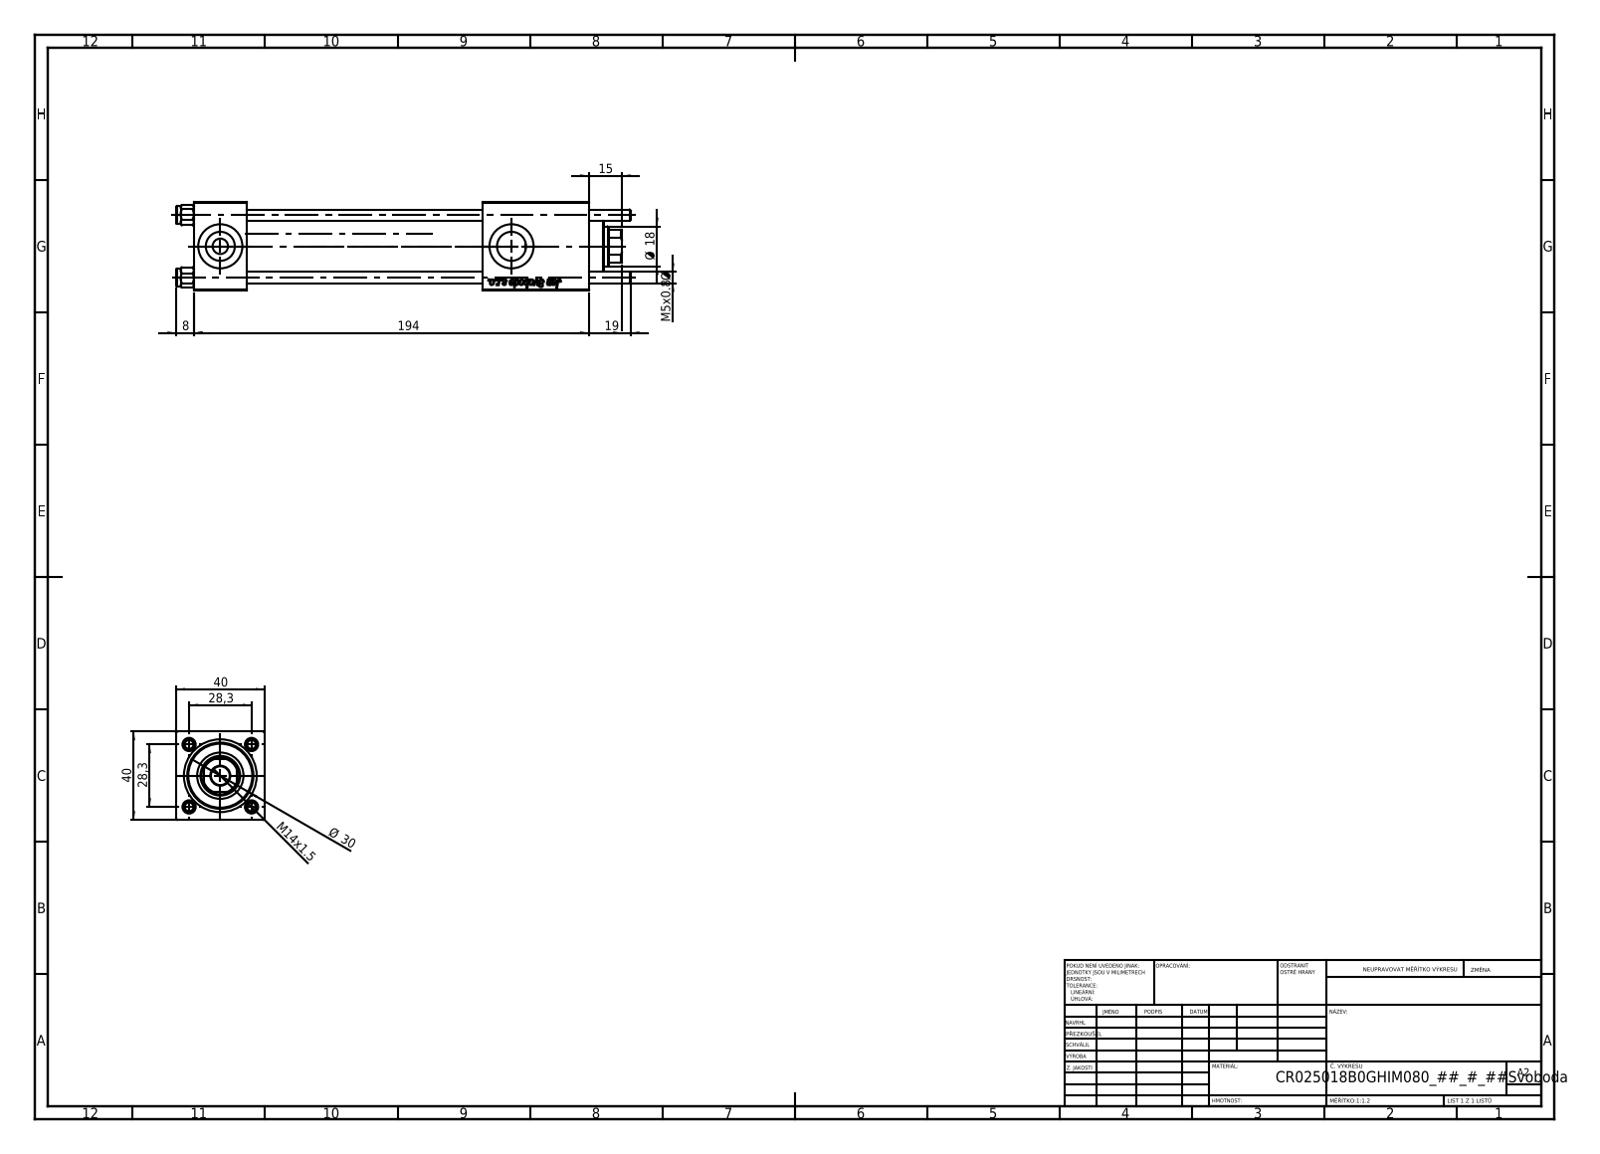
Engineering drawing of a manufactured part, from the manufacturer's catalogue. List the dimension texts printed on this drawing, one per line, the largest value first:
194
40
40
Ø 30
28,3
28,3
19
Ø 18
15
M14x1.5
8
M5x0.8 Ø
